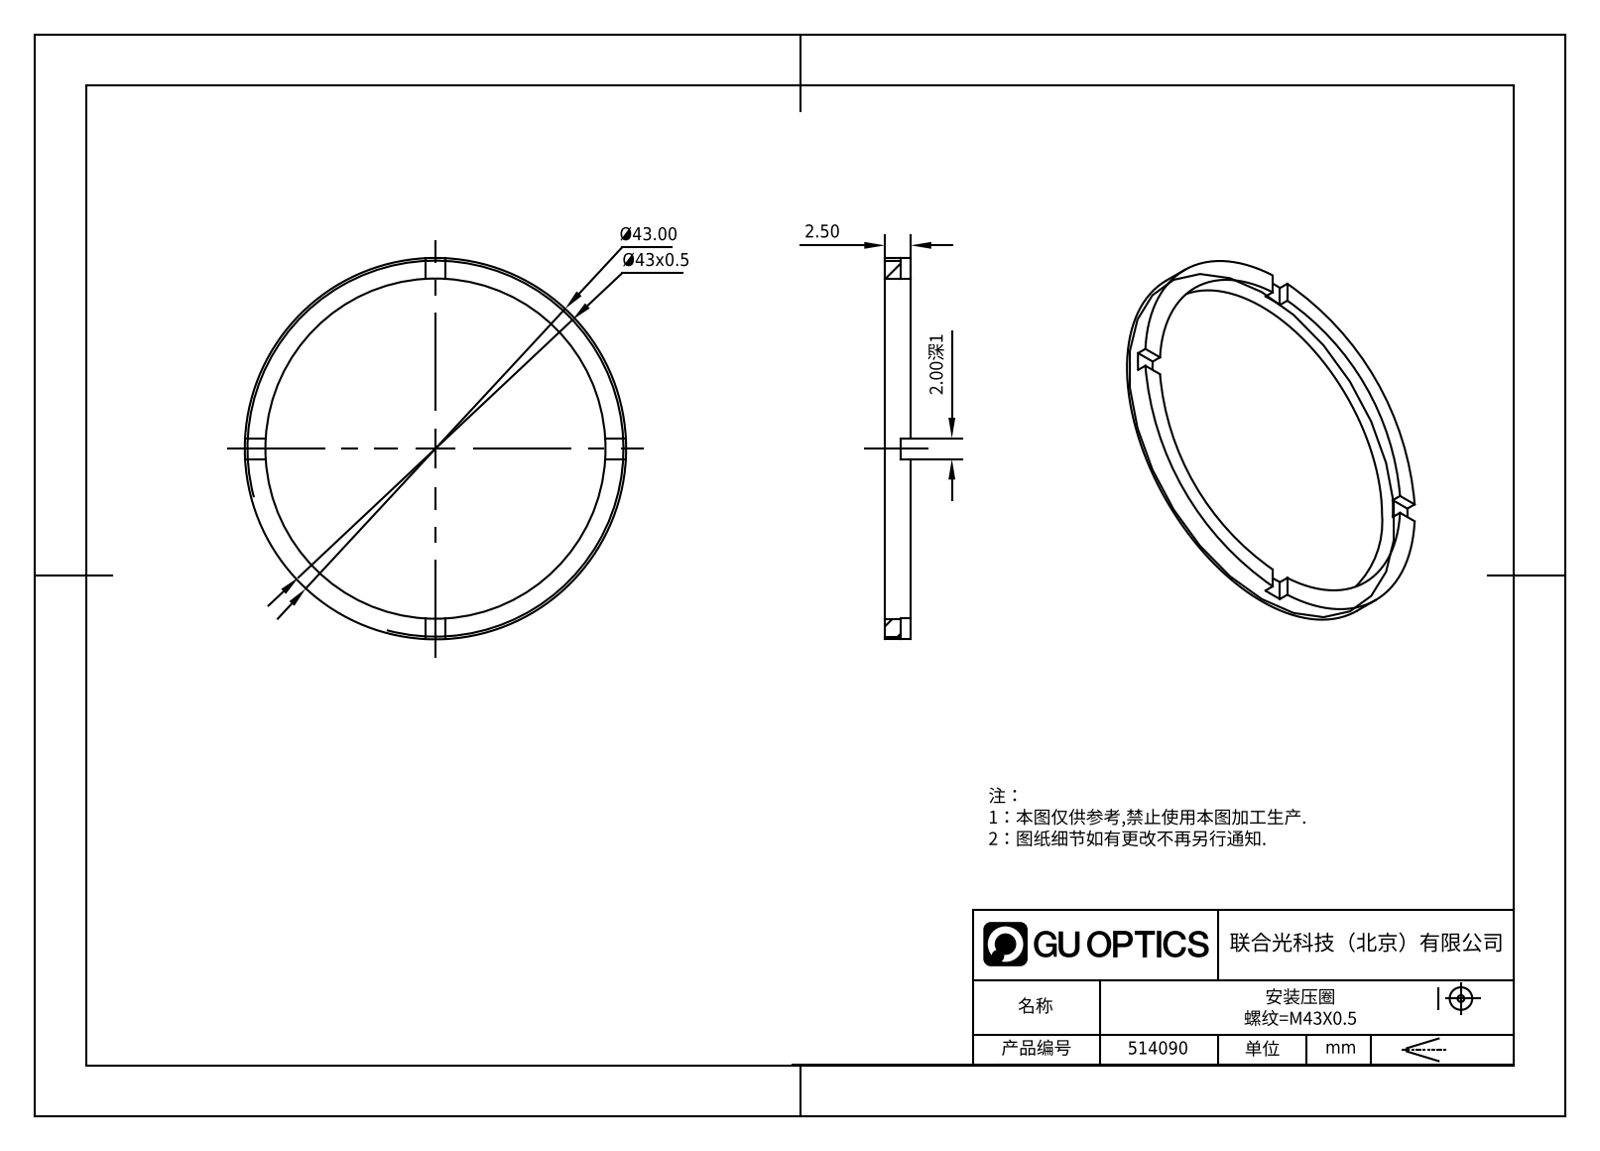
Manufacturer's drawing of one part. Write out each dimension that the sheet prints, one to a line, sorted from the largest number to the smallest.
Ø43.00
Ø43x0.5
2.50
2.00深1
